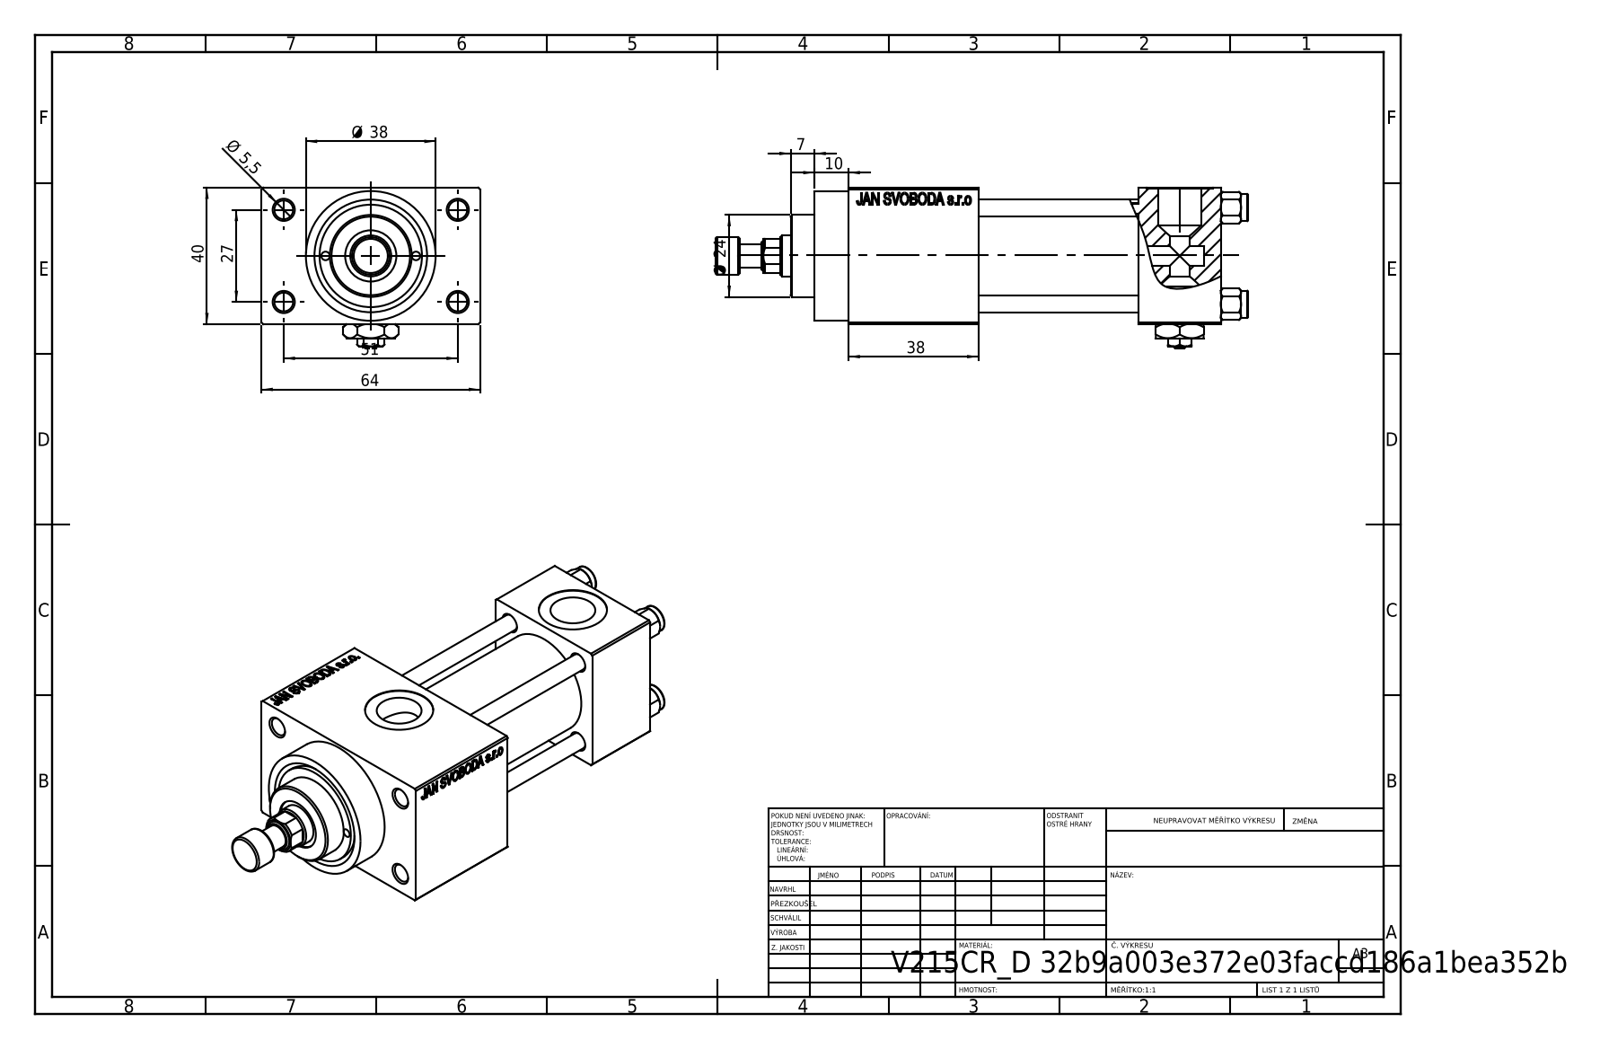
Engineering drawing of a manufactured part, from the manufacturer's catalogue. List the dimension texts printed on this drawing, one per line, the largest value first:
64
51
40
38
Ø 38
27
Ø 24
10
7
Ø 5,5
